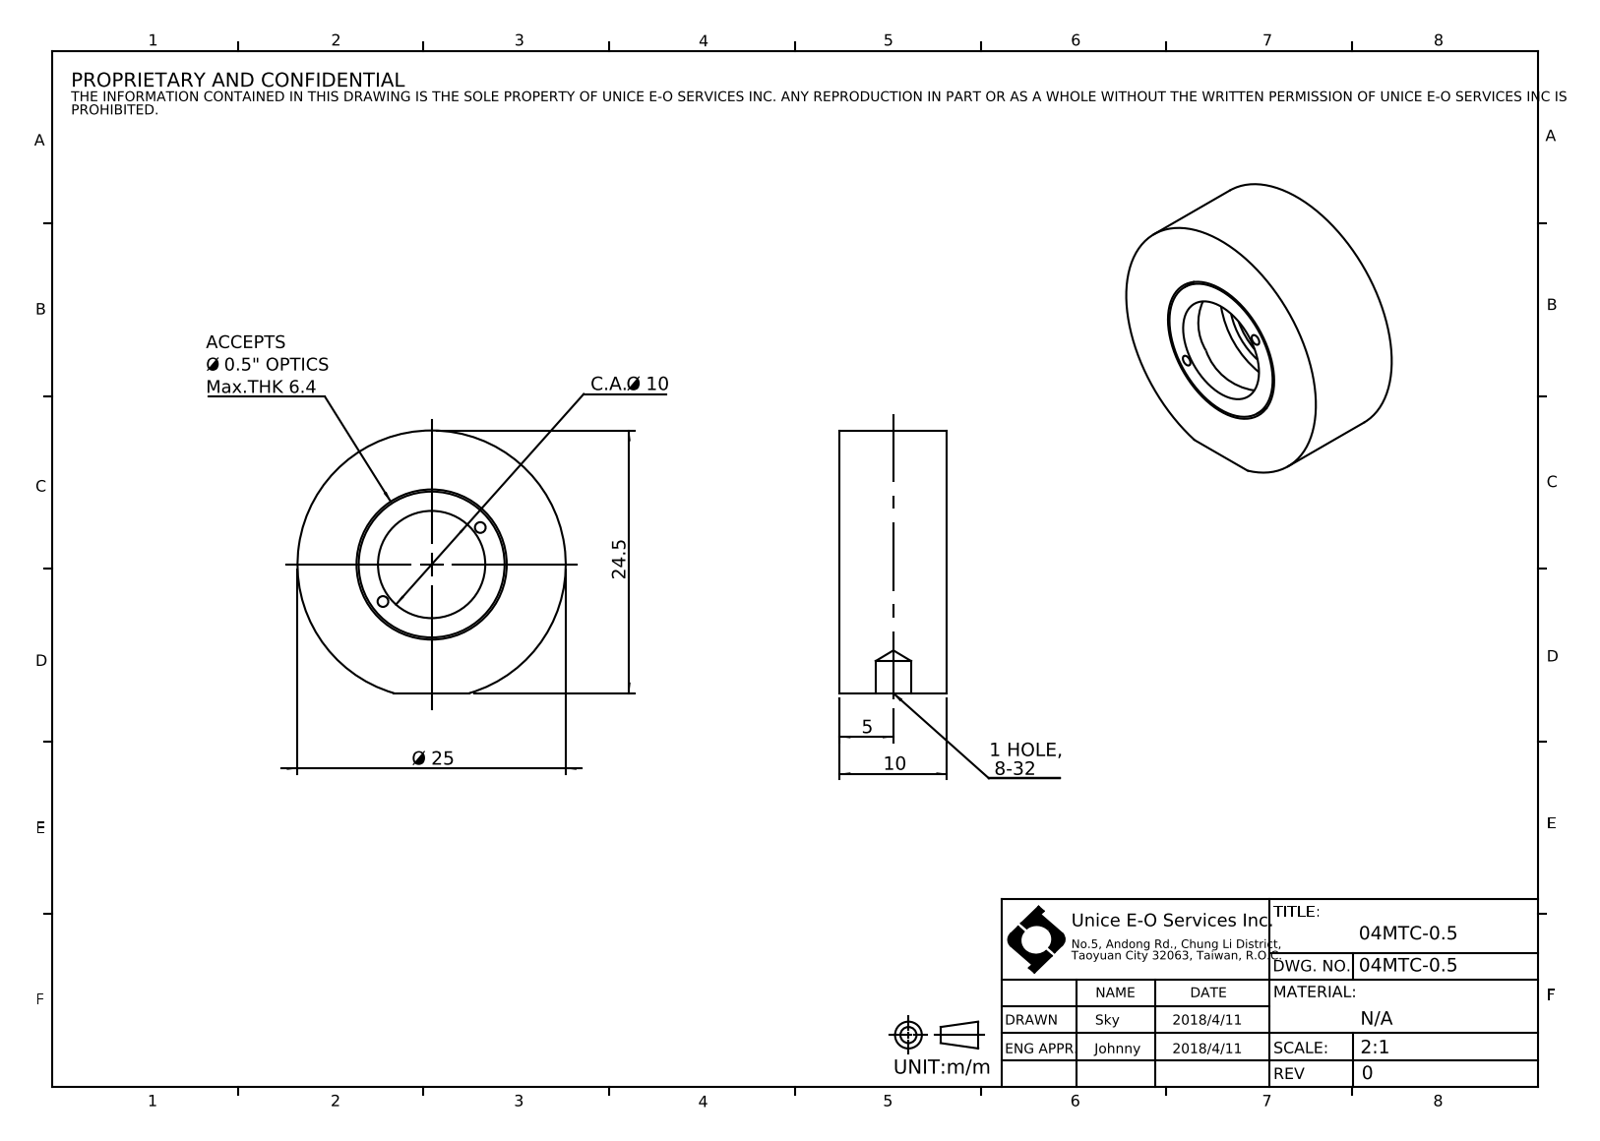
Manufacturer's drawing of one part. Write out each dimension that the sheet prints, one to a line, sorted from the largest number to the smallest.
Ø 25
24.5
C.A. Ø 10
10
5
